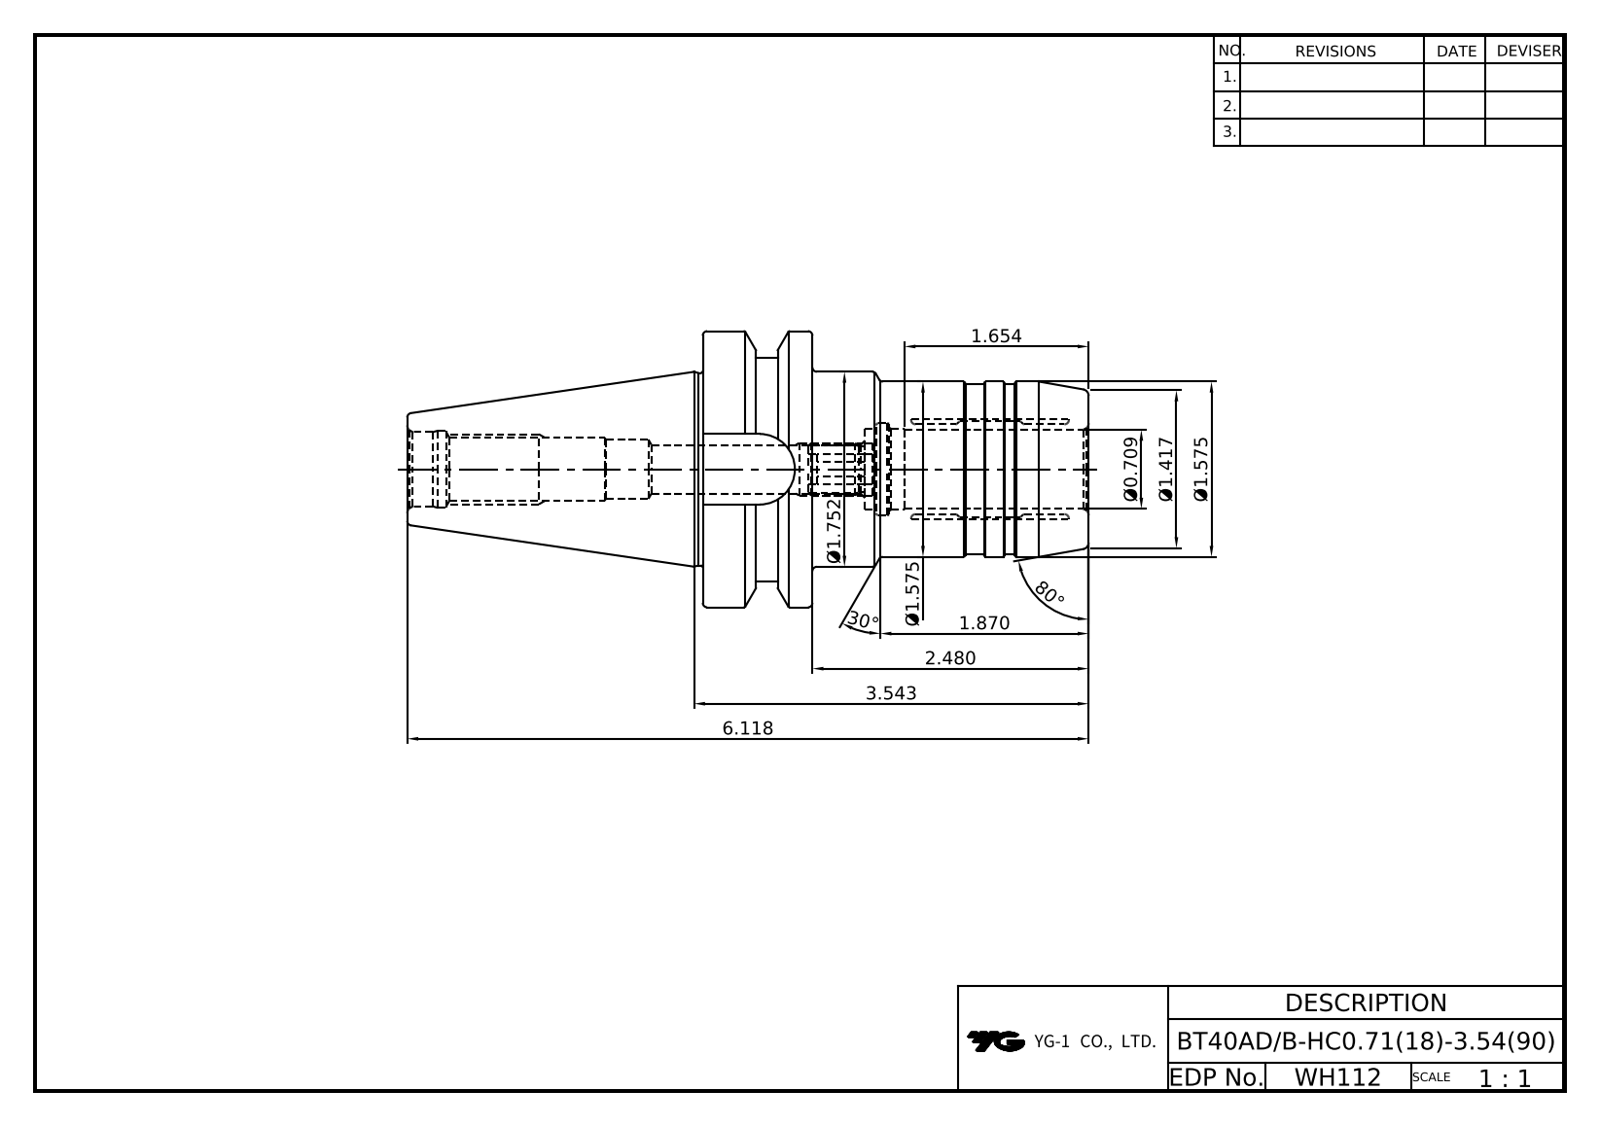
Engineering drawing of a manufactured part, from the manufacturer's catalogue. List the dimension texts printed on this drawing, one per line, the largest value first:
80°
30°
6.118
3.543
2.480
1.870
Ø1.752
1.654
Ø1.575
Ø1.575
Ø1.417
Ø0.709
